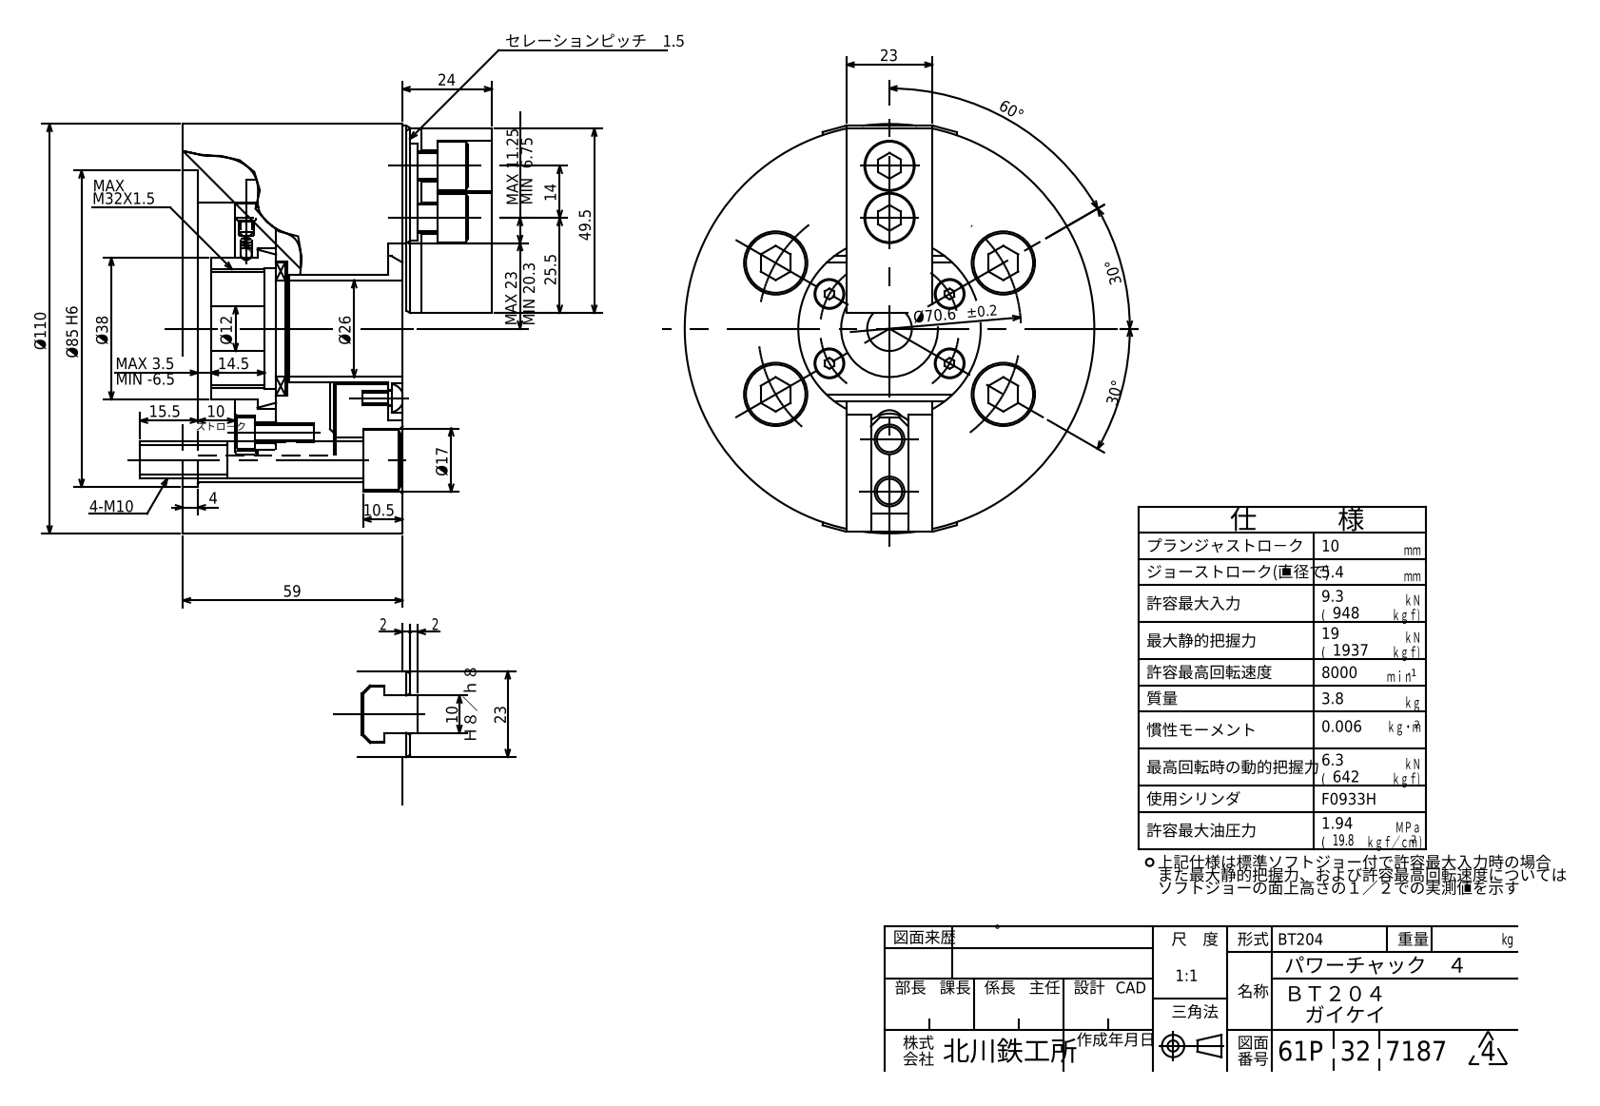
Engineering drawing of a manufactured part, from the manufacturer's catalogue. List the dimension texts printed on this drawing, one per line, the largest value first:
Ø110
Ø85
Ø70.6 ±0.2
60°
59
49.5
Ø38
30°
30°
Ø26
25.5
24
MAX 23
23
23
Ø17
15.5
14.5
14
Ø12
MAX 11.25
10.5
10
10
4
MAX 3.5
2
2
